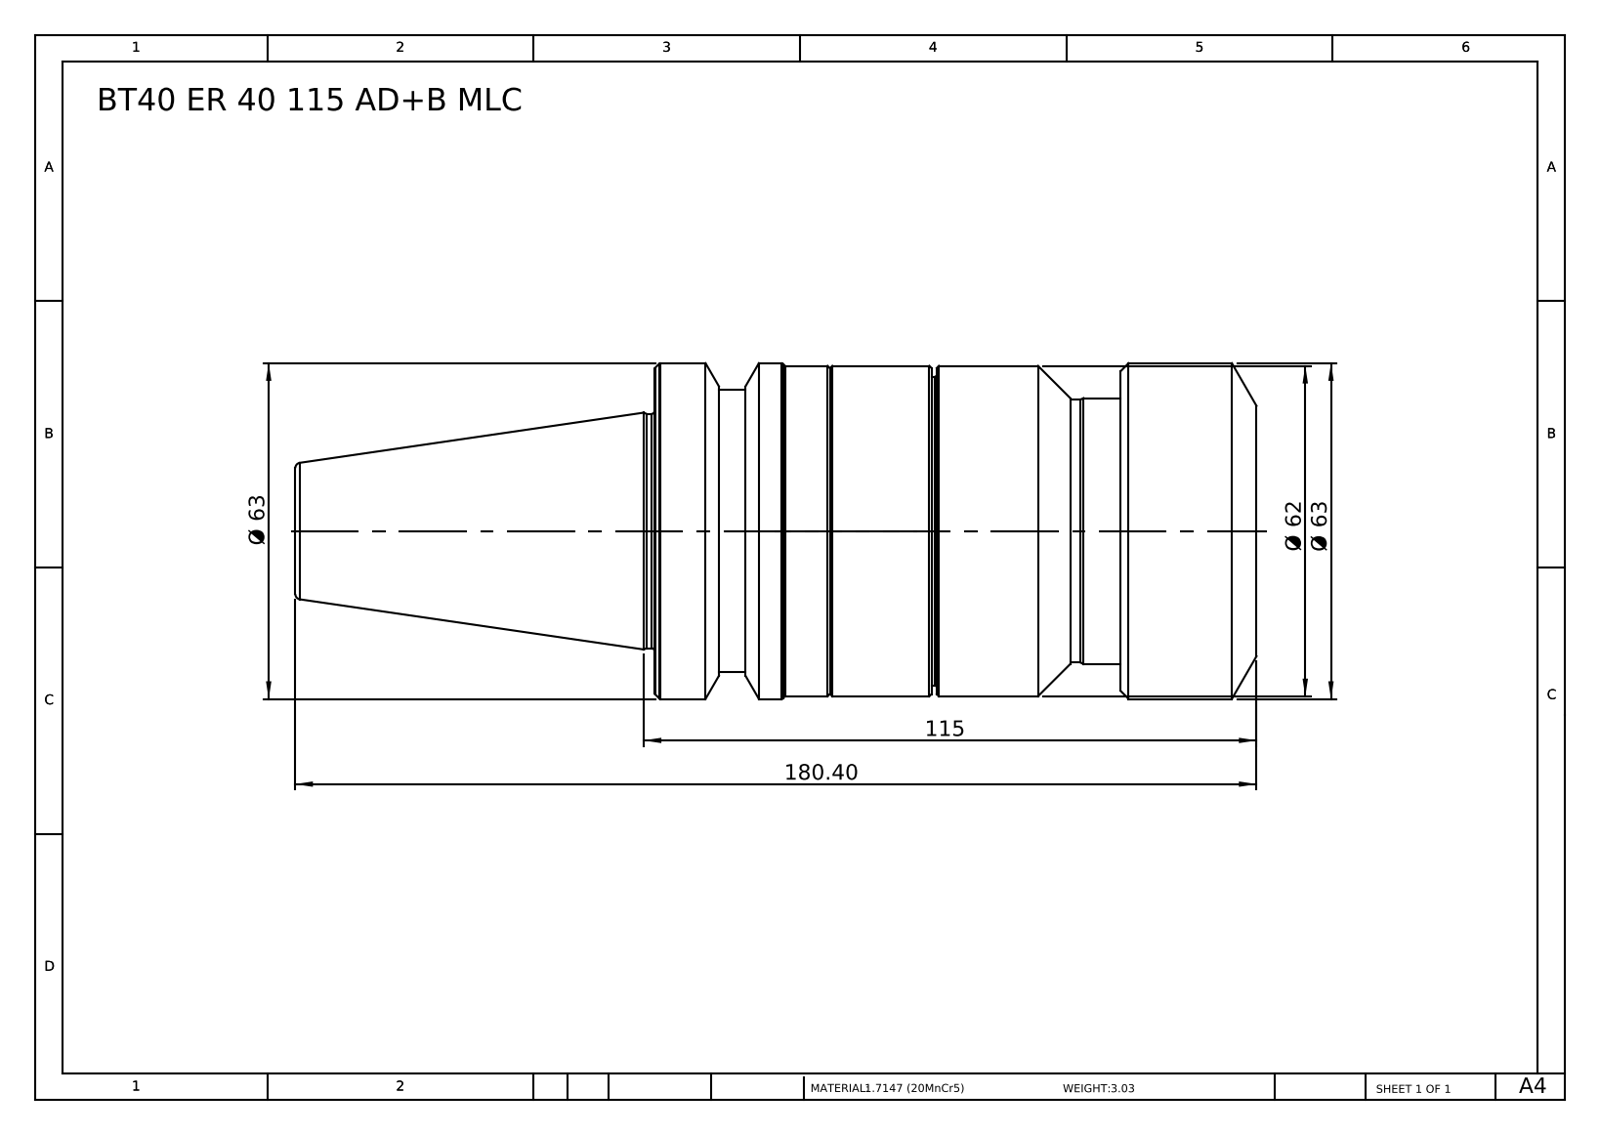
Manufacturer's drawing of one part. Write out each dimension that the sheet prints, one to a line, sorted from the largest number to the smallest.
180.40
115
Ø 63
Ø 63
Ø 62
